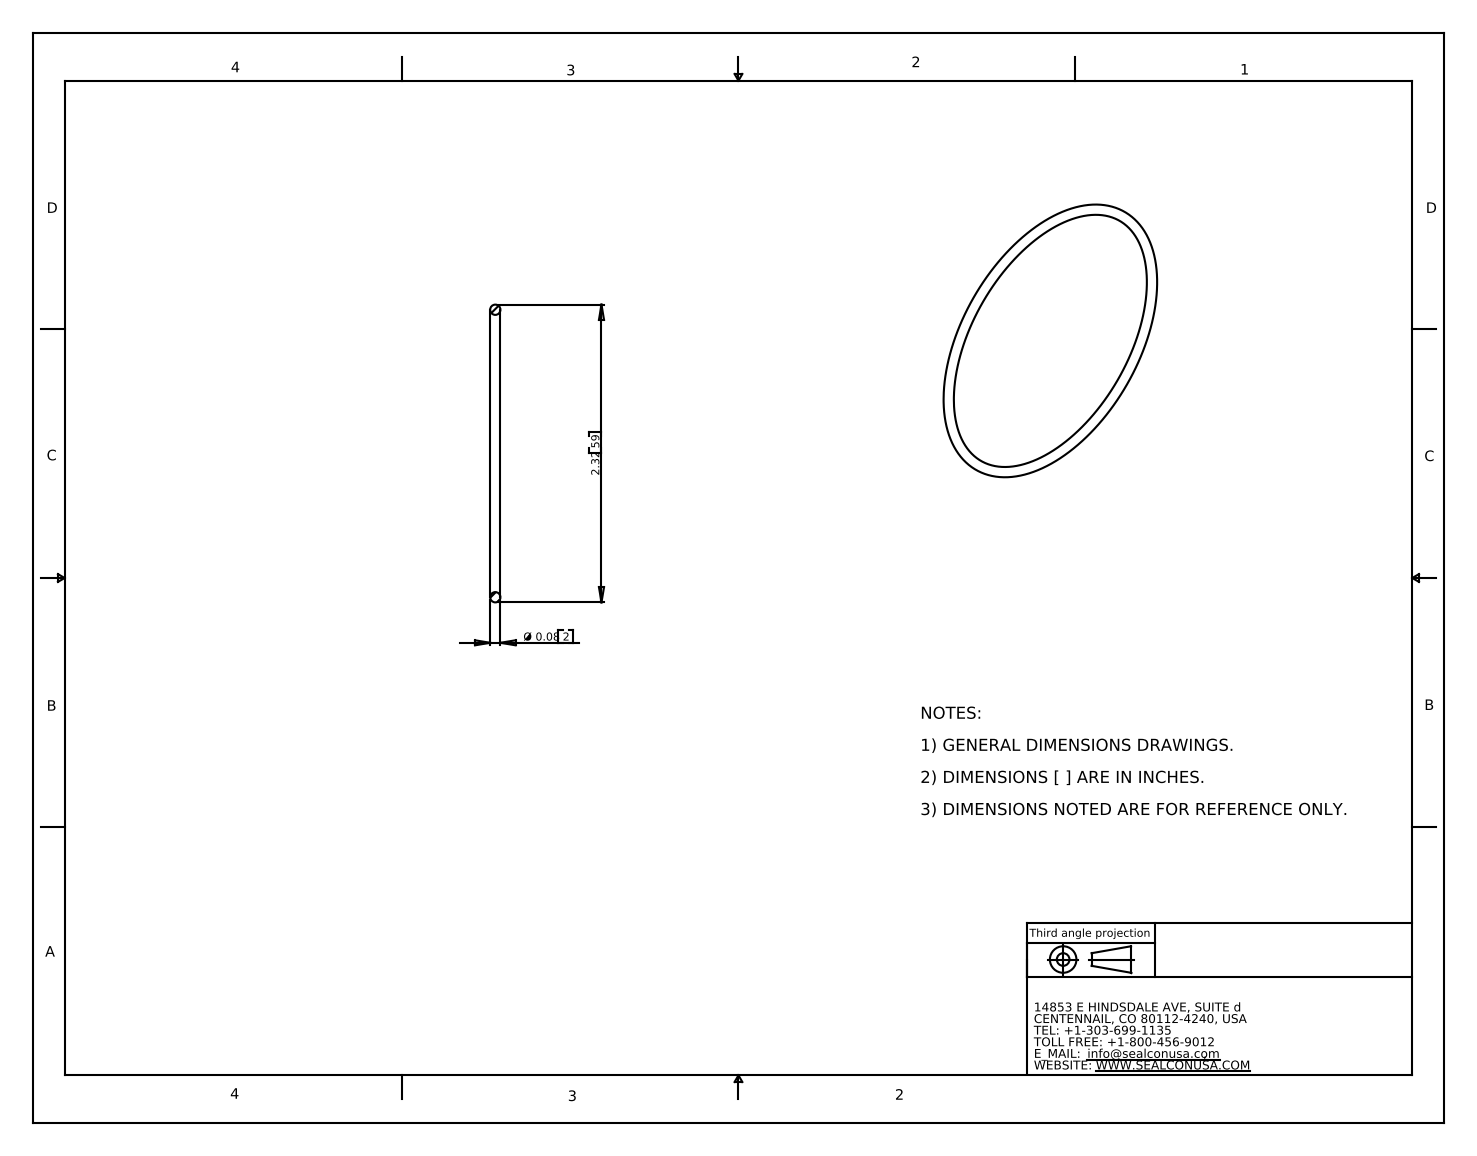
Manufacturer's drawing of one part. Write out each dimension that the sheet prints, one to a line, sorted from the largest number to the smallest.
2.32 59
Ø 0.08 2
